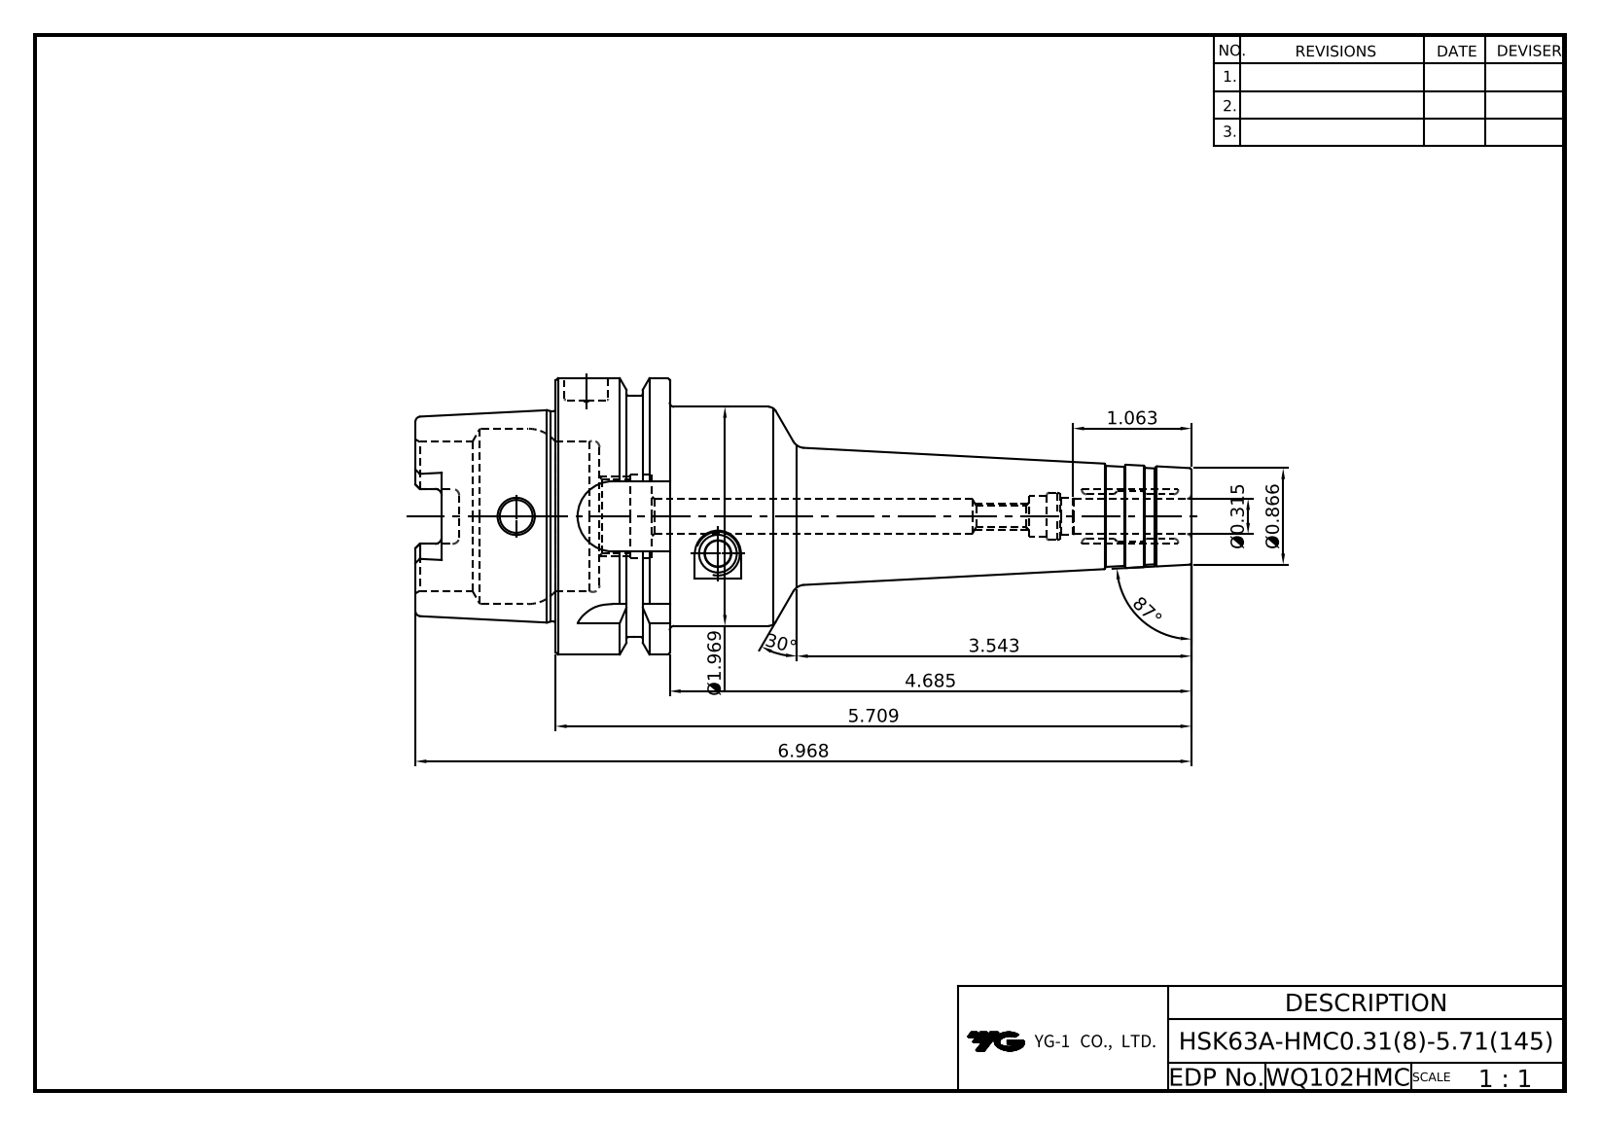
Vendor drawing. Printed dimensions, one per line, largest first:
87°
30°
6.968
5.709
4.685
3.543
Ø1.969
1.063
Ø0.866
Ø0.315
